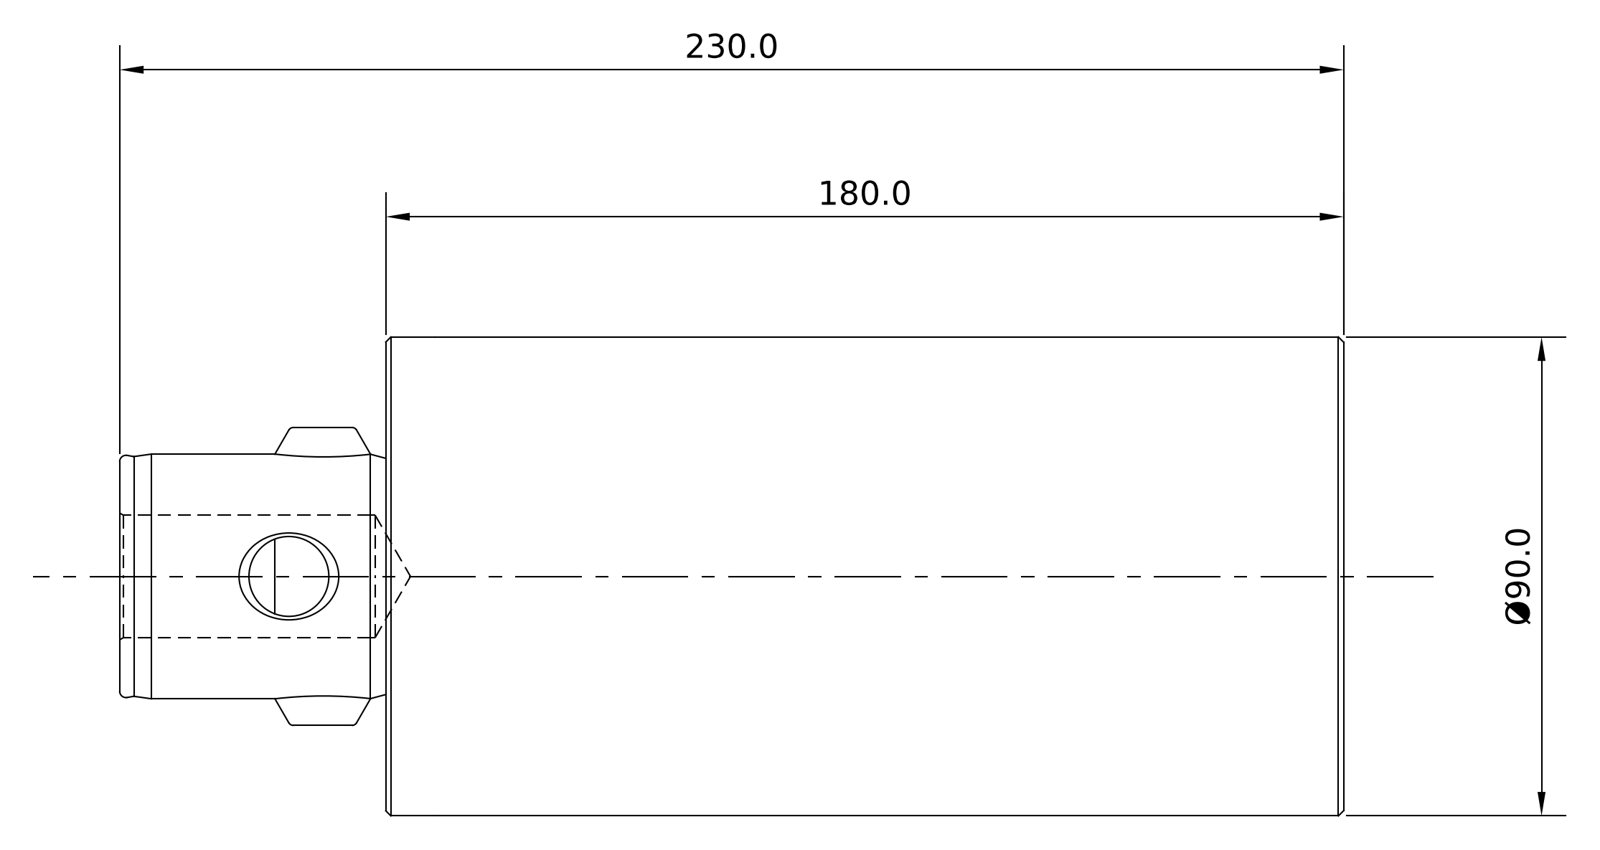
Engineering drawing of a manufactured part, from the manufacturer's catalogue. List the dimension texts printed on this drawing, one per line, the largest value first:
230.0
180.0
Ø90.0
